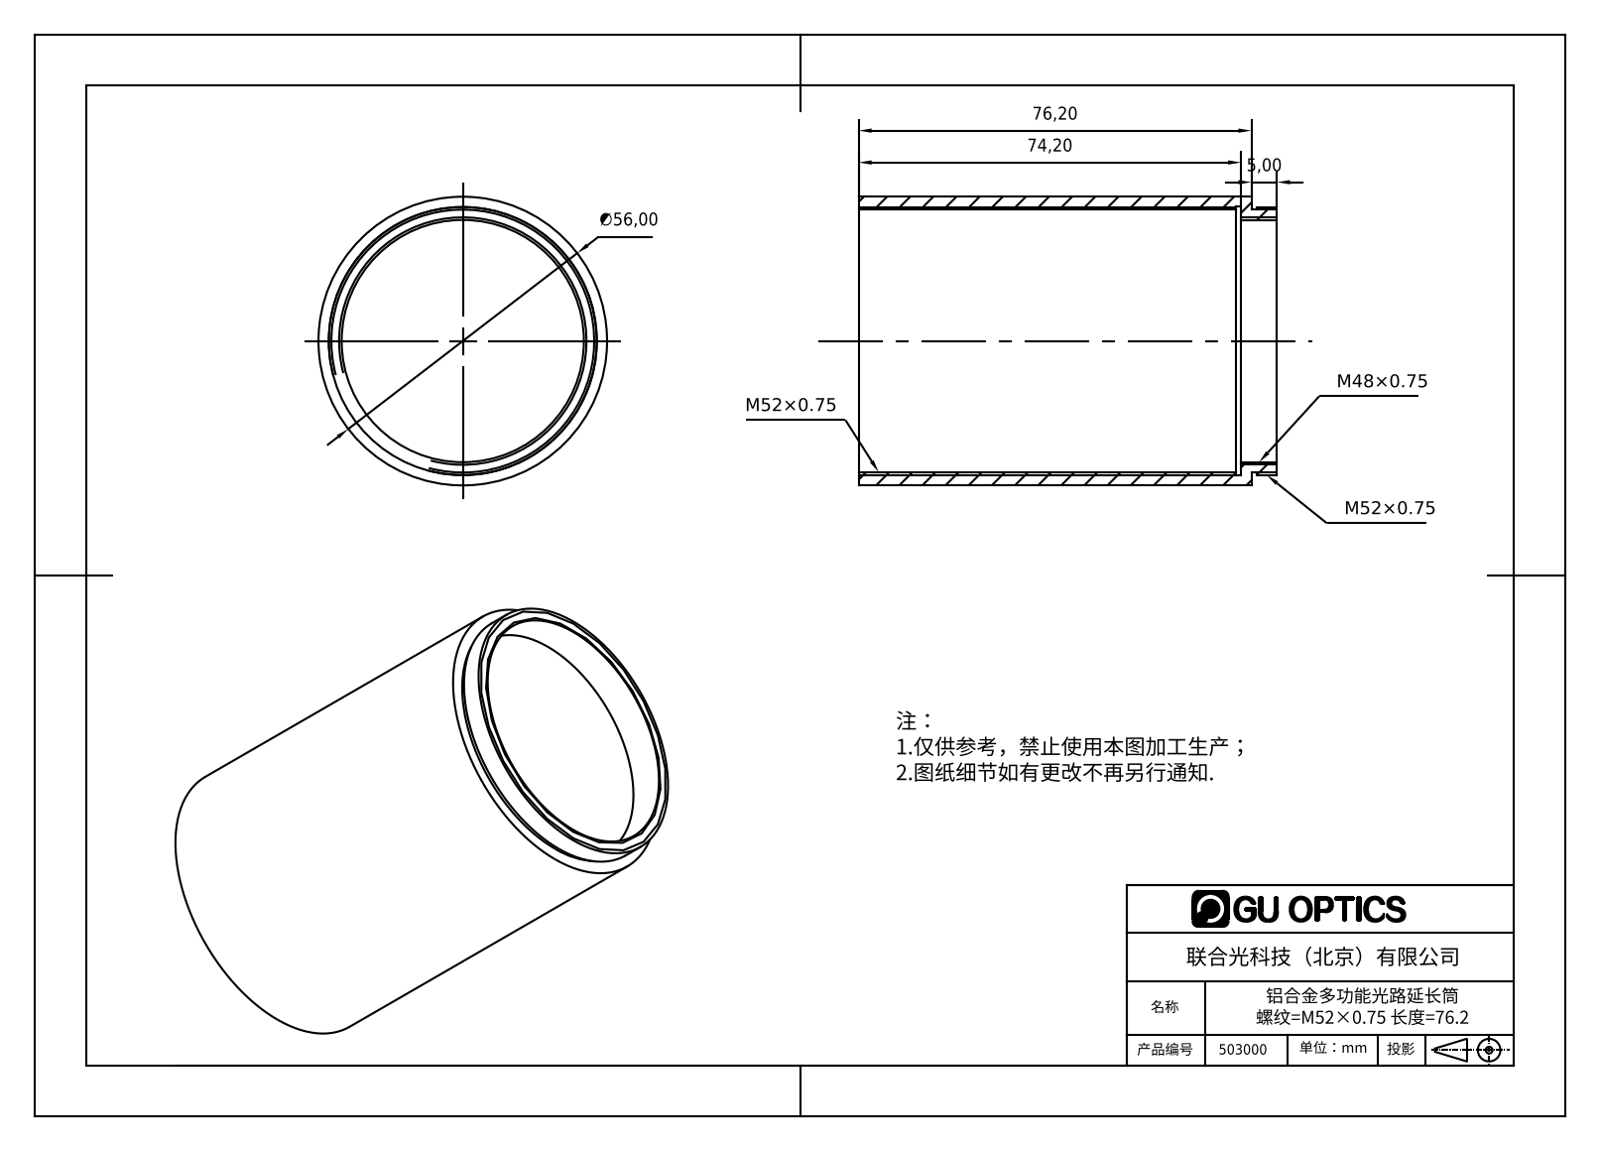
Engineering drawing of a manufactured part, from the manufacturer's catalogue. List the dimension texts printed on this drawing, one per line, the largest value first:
76,20
74,20
∅56,00
5,00
